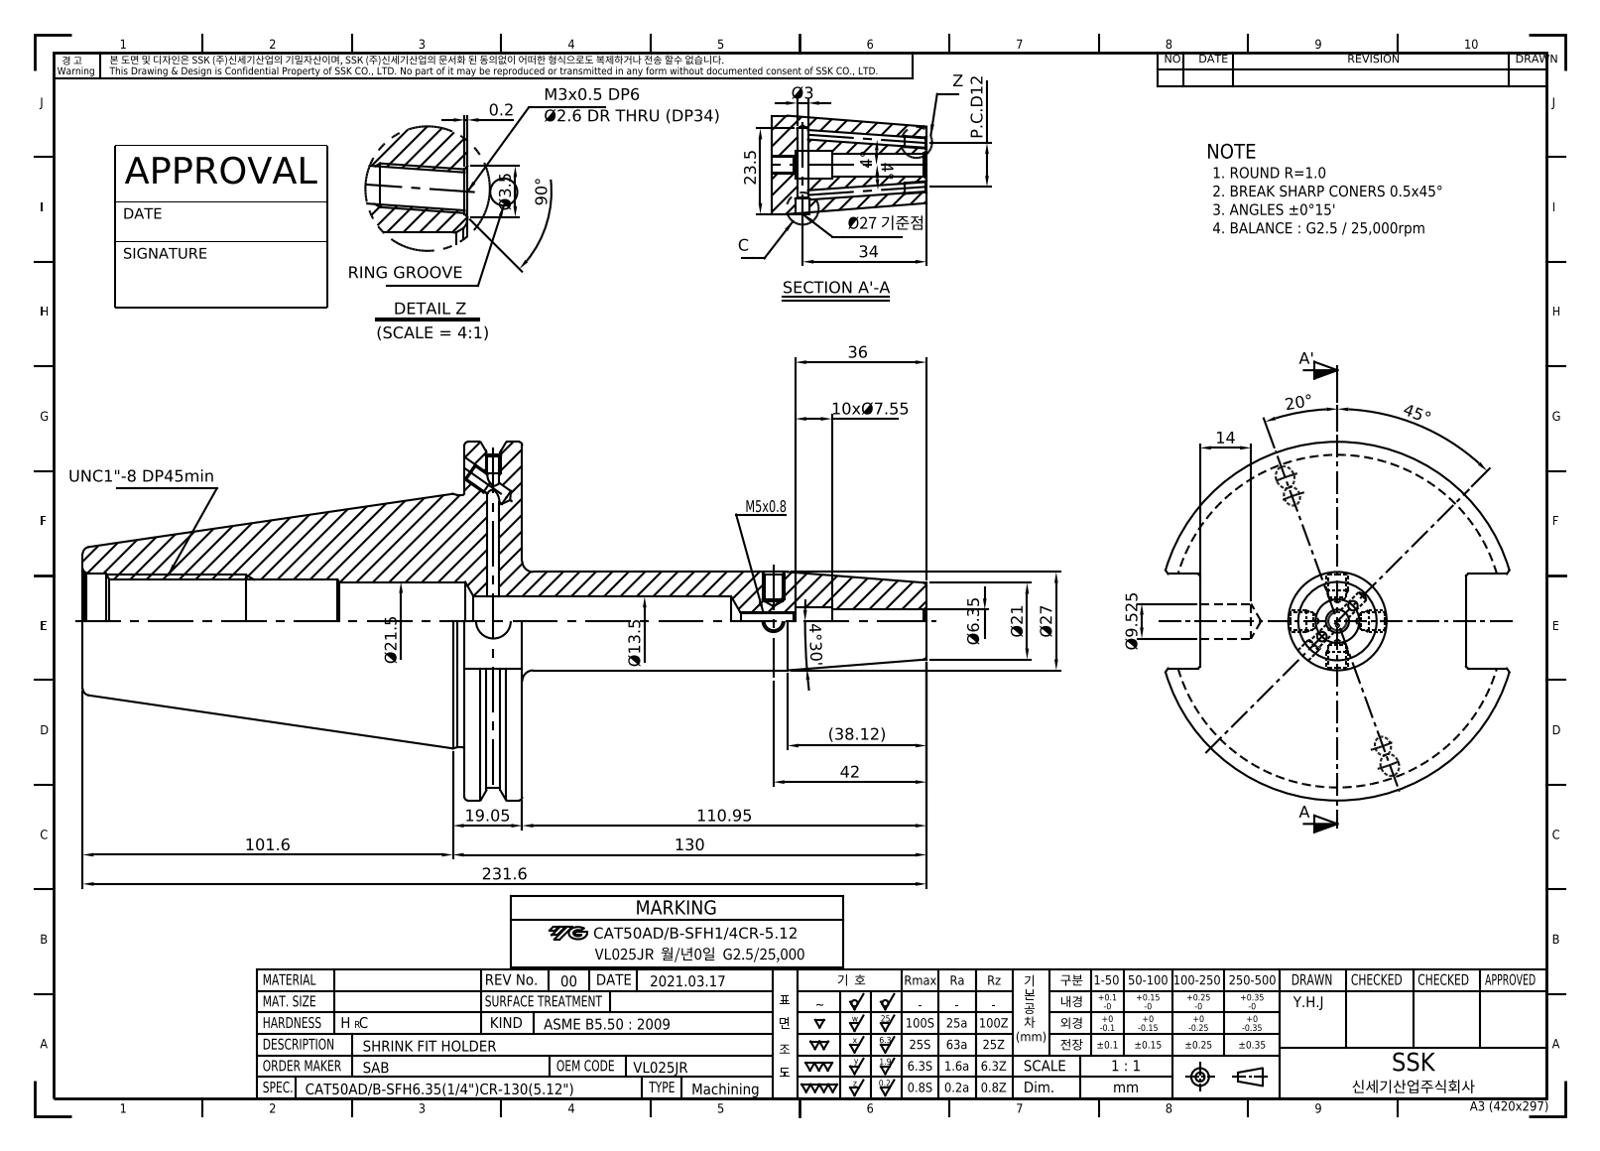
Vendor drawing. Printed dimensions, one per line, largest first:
231.6
130
110.95
101.6
90°
45°
42
(38.12)
36
34
Ø27
23.5
Ø21.5
Ø21
20°
19.05
14
Ø13.5
P.C.D12
Ø9.525
10xØ7.55
Ø6.35
4°30'
4°
4°
Ø3.5
Ø3
0.2
